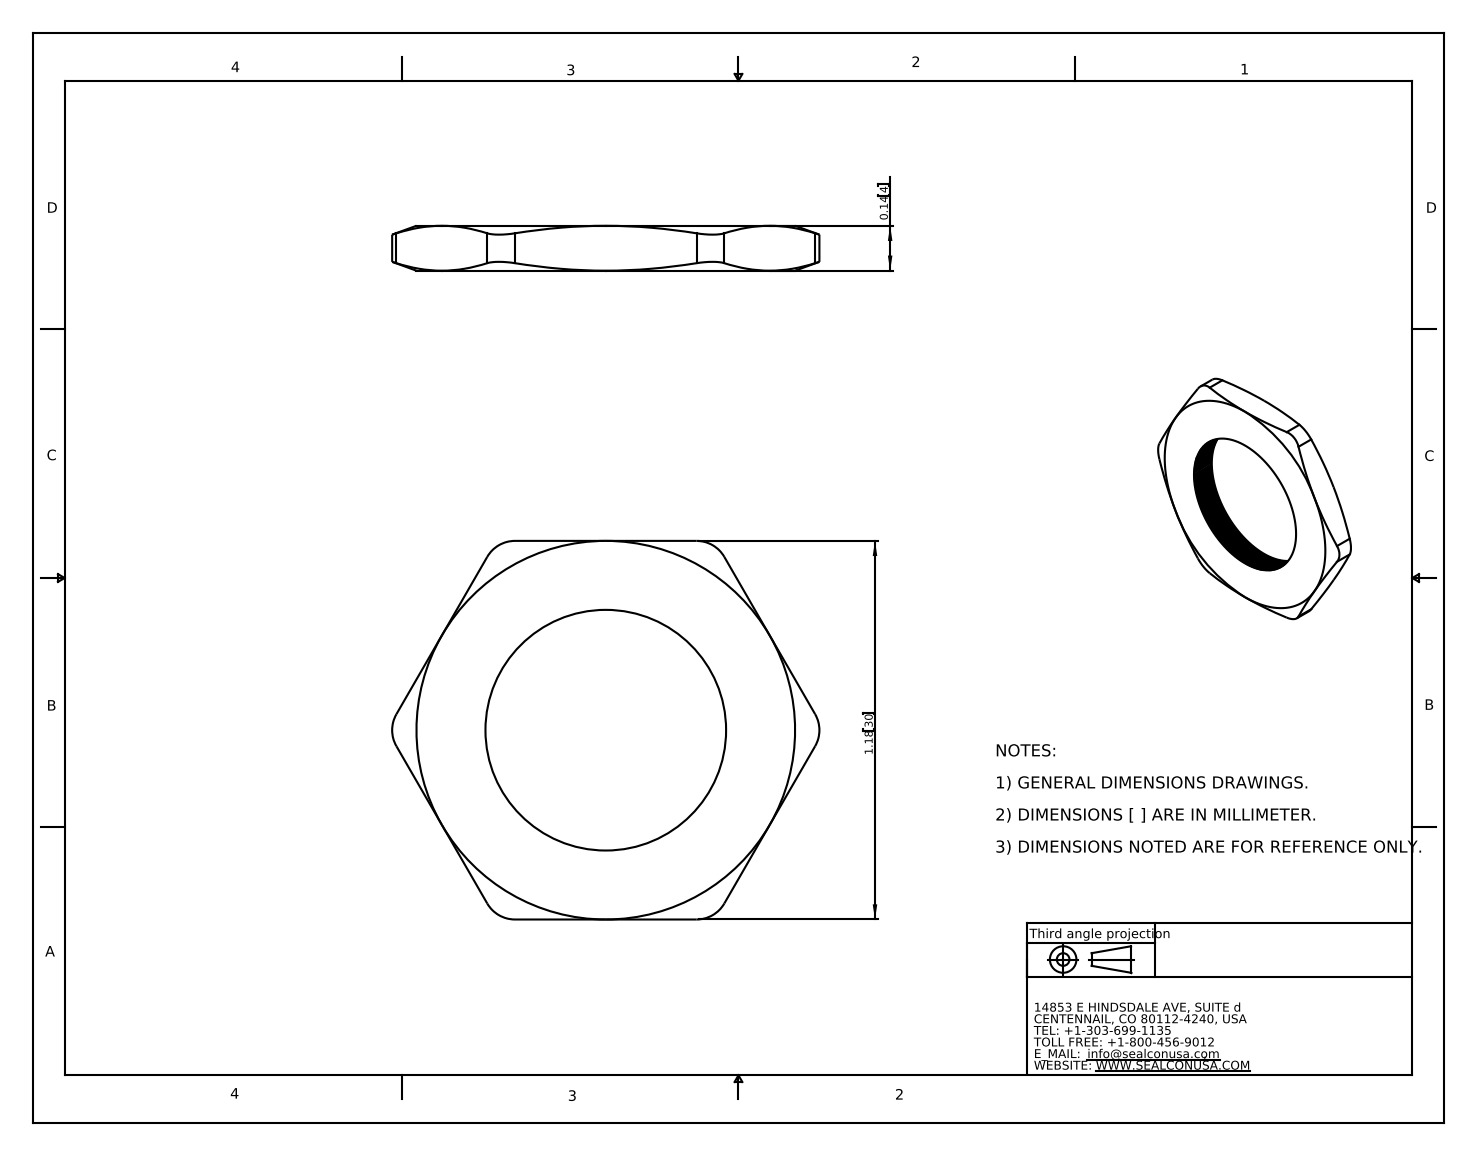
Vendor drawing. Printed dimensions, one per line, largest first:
1.18 30
0.14 4
